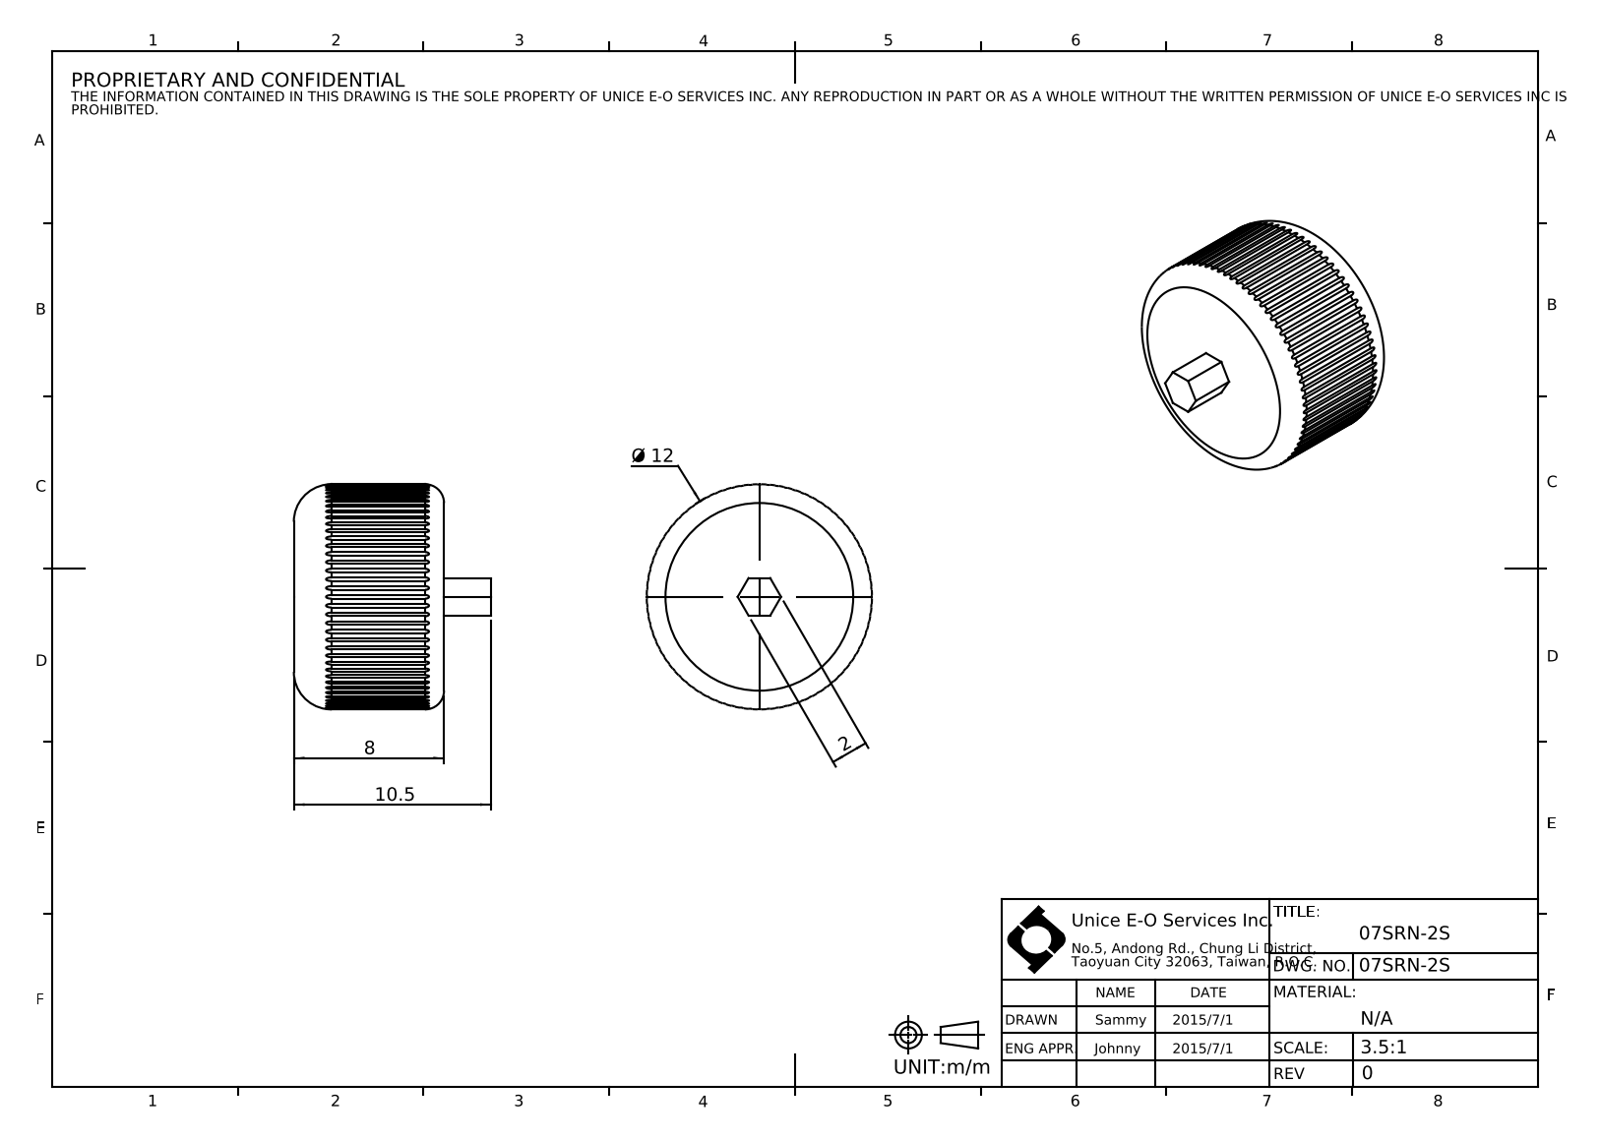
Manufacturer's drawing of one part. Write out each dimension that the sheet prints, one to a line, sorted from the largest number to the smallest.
Ø 12
10.5
8
2
